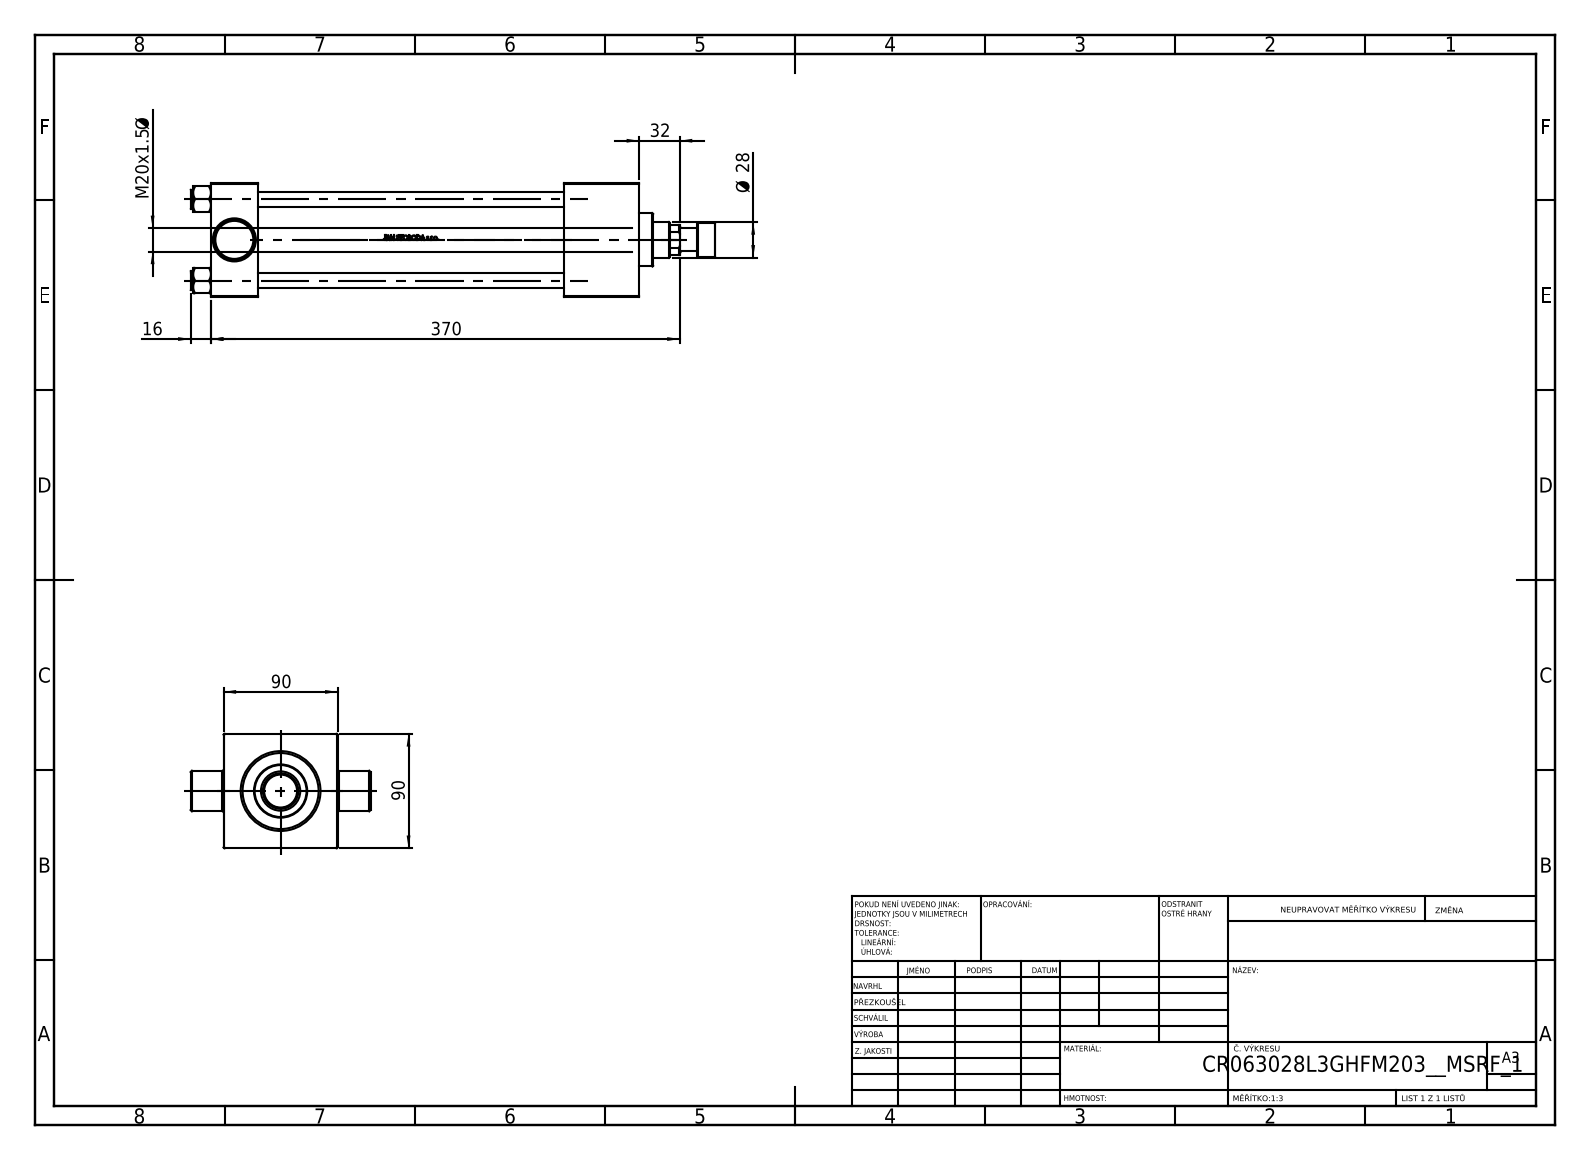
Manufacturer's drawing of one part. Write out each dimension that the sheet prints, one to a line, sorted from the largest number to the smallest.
370
90
90
32
Ø 28
M20x1.5 Ø
16
